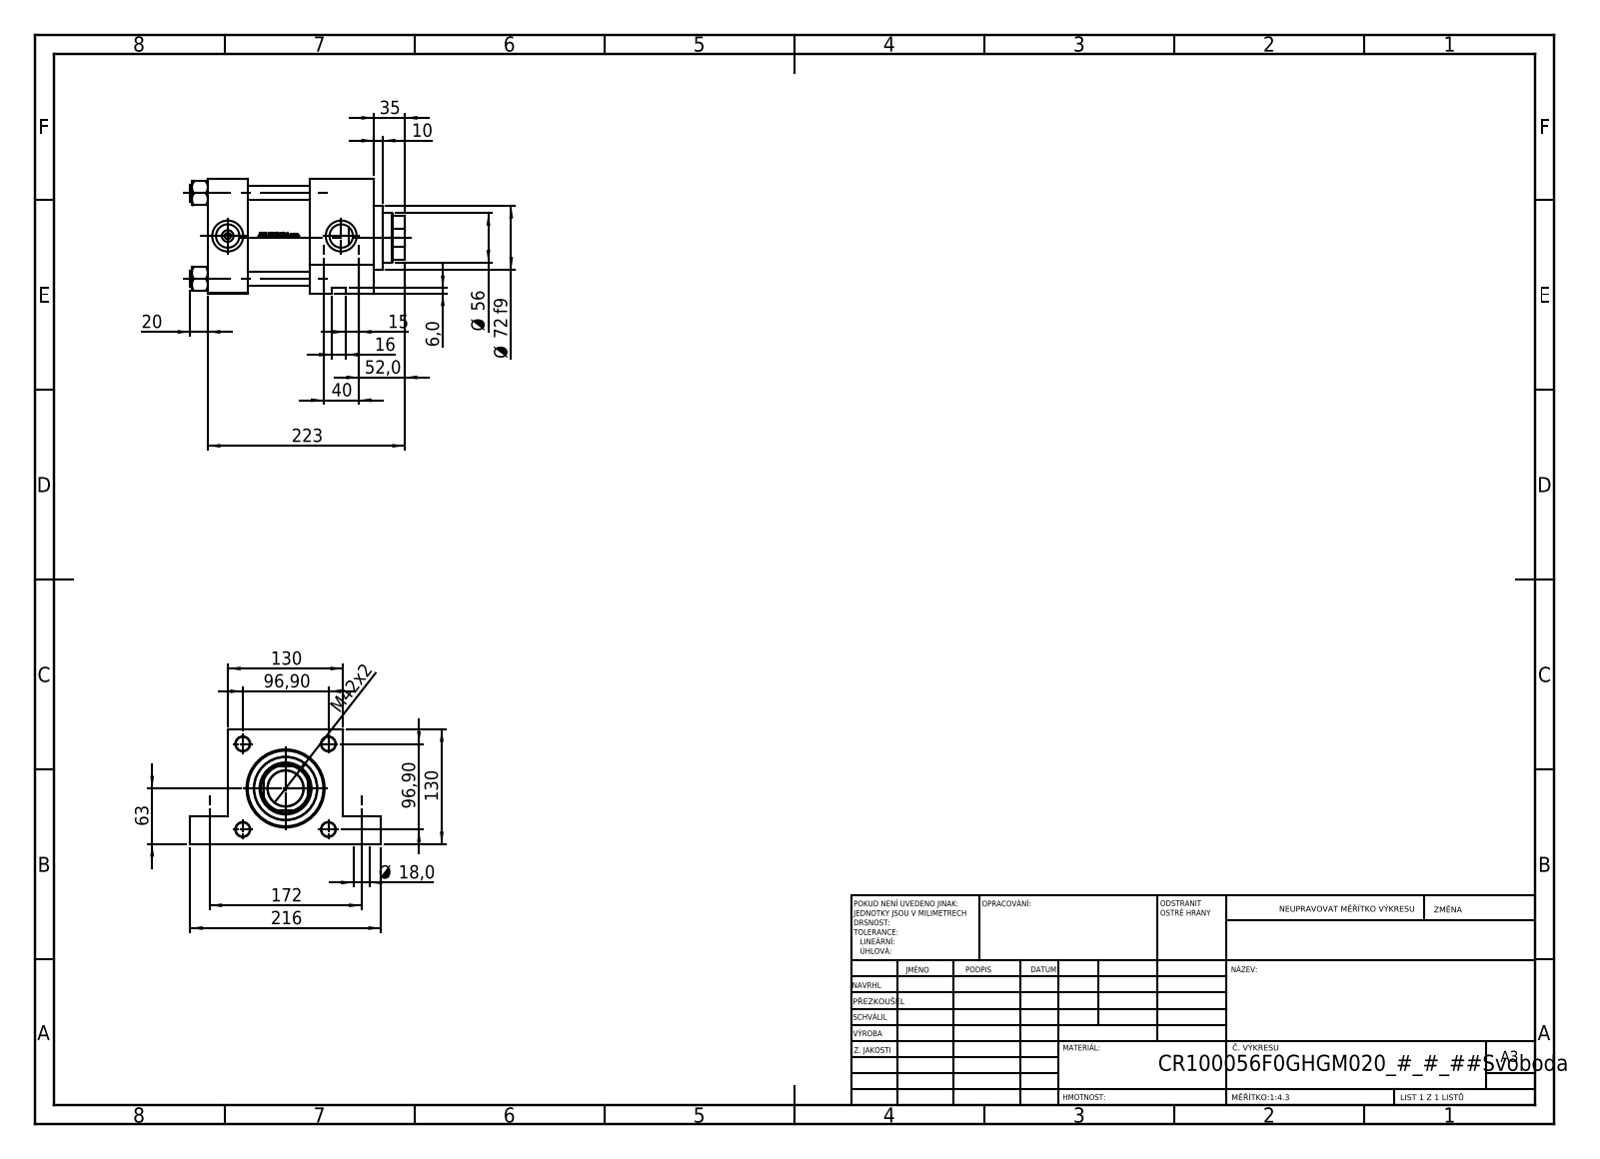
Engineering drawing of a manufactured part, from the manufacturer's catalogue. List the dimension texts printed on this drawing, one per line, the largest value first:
223
216
172
130
130
96,90
96,90
Ø 72 f9
63
Ø 56
52,0
M42x2
40
35
20
Ø 18,0
16
15
10
6,0
